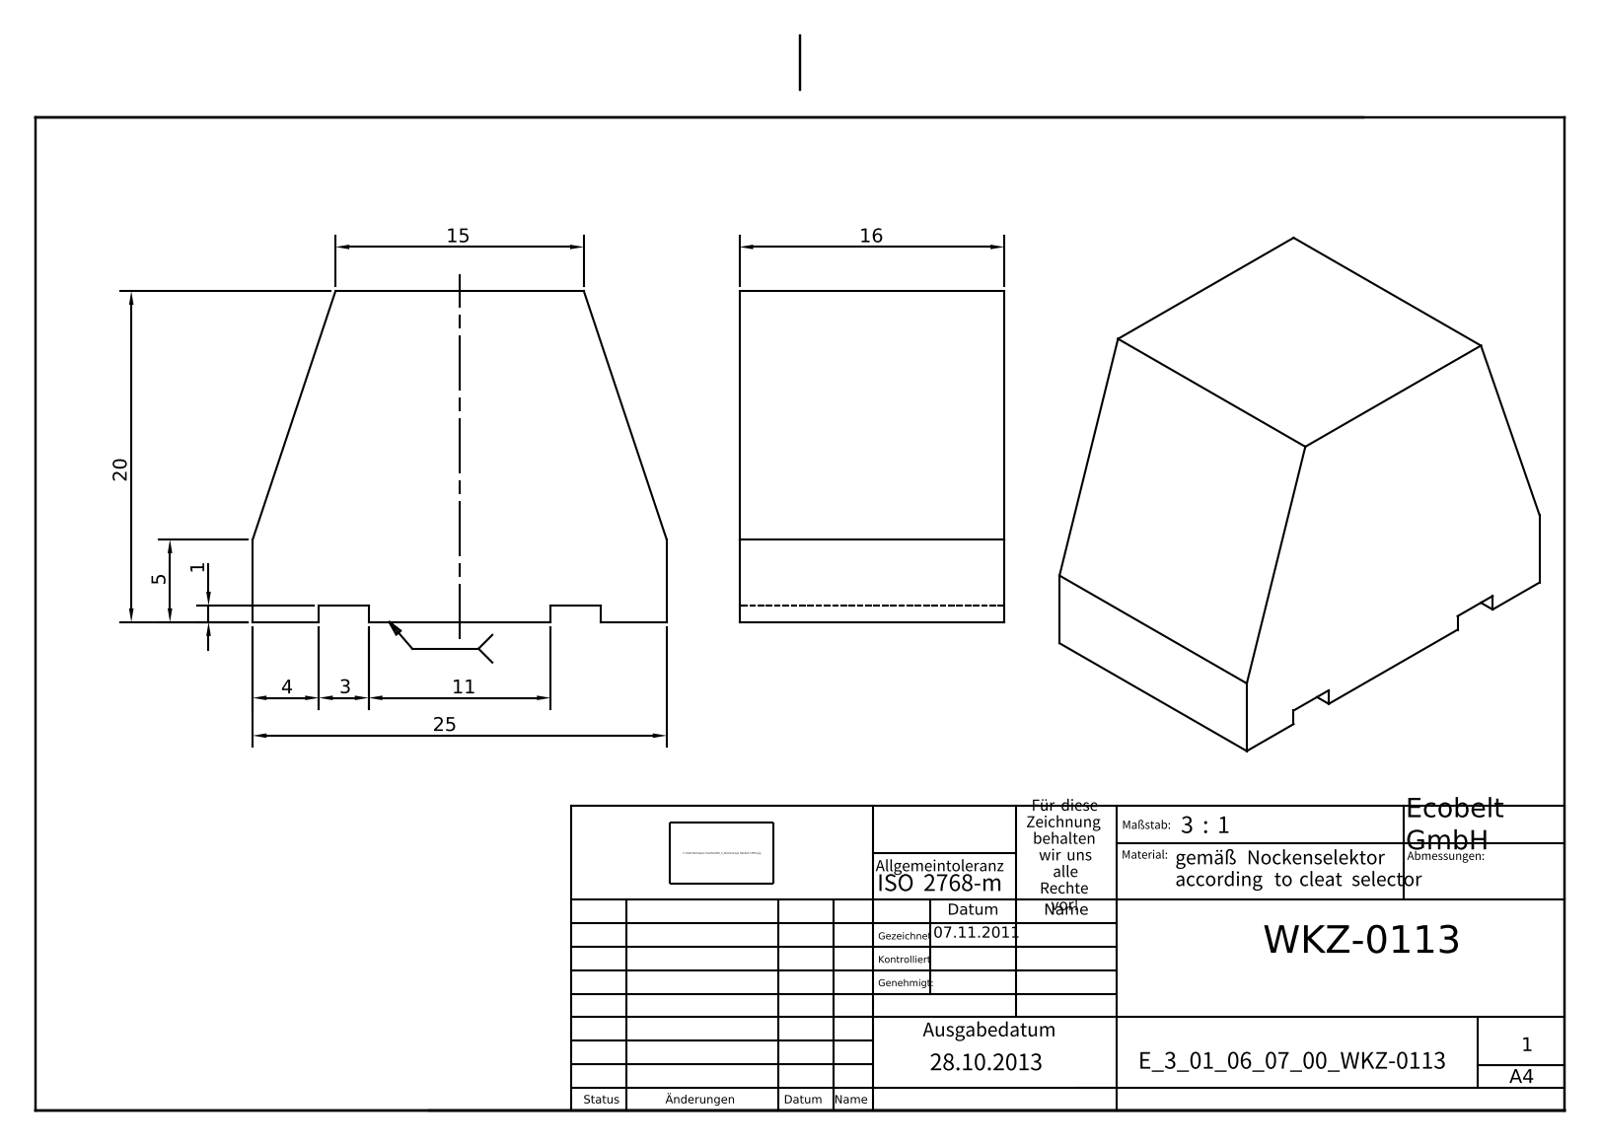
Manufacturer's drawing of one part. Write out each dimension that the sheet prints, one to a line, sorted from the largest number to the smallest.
25
20
16
15
11
5
4
3
1
